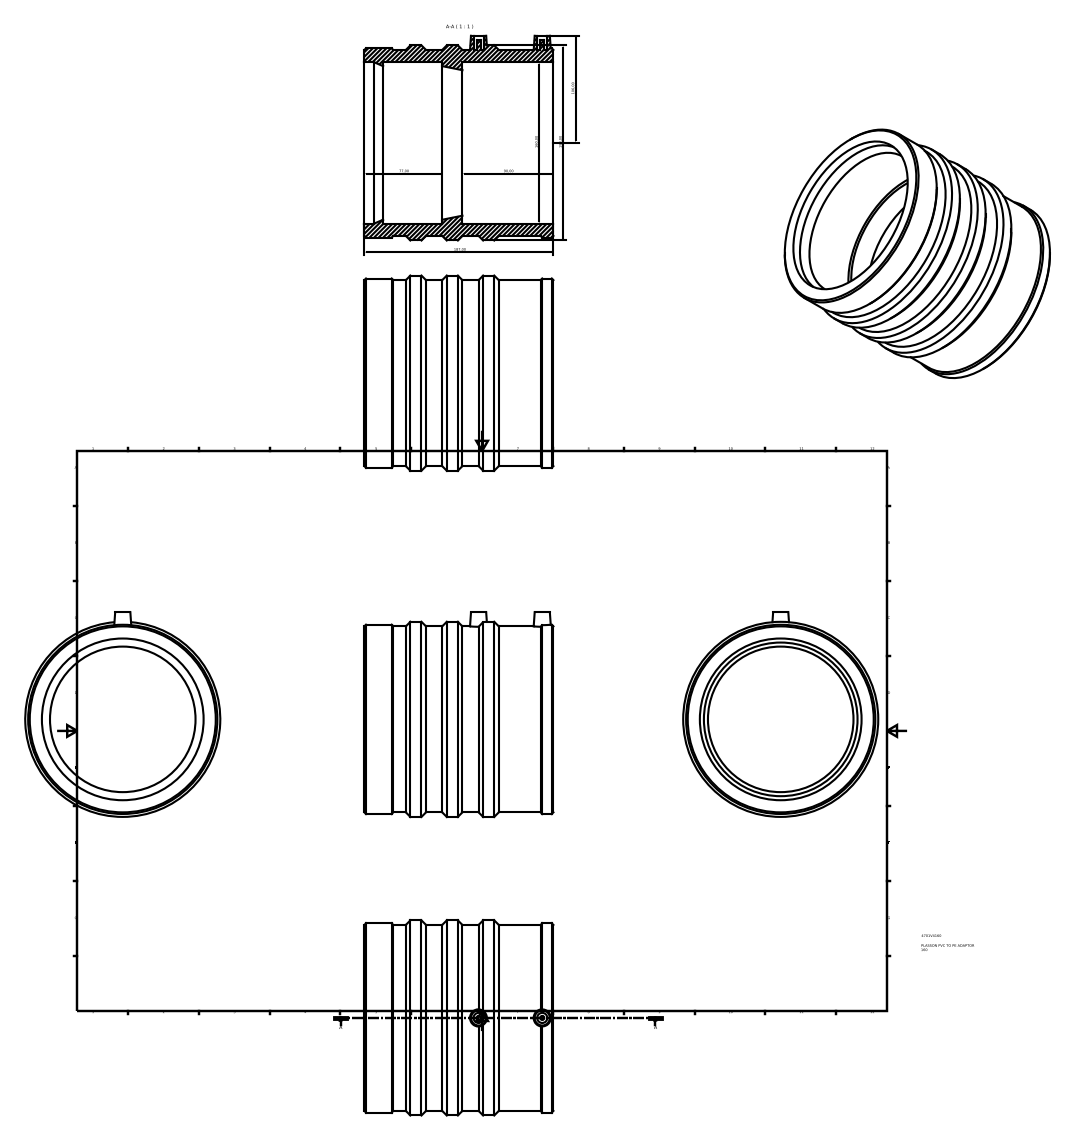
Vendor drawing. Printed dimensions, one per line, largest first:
193,00
187,00
160,00
106,00
90,00
77,00
